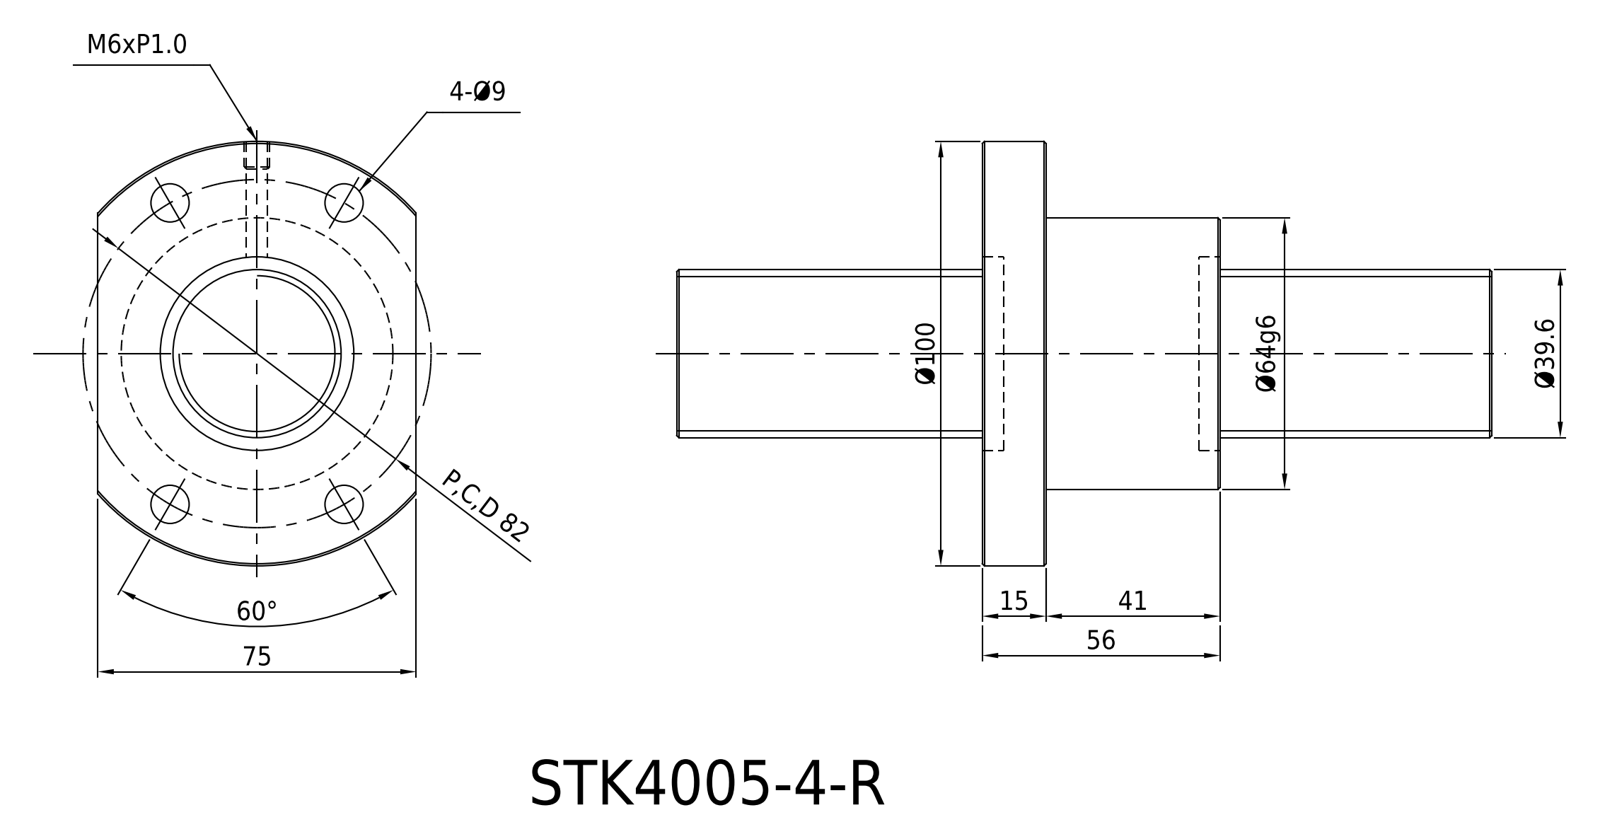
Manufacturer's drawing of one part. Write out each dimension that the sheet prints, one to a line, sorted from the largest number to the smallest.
Ø100
P,C,D 82
75
Ø64g6
60°
56
41
Ø39.6
15
